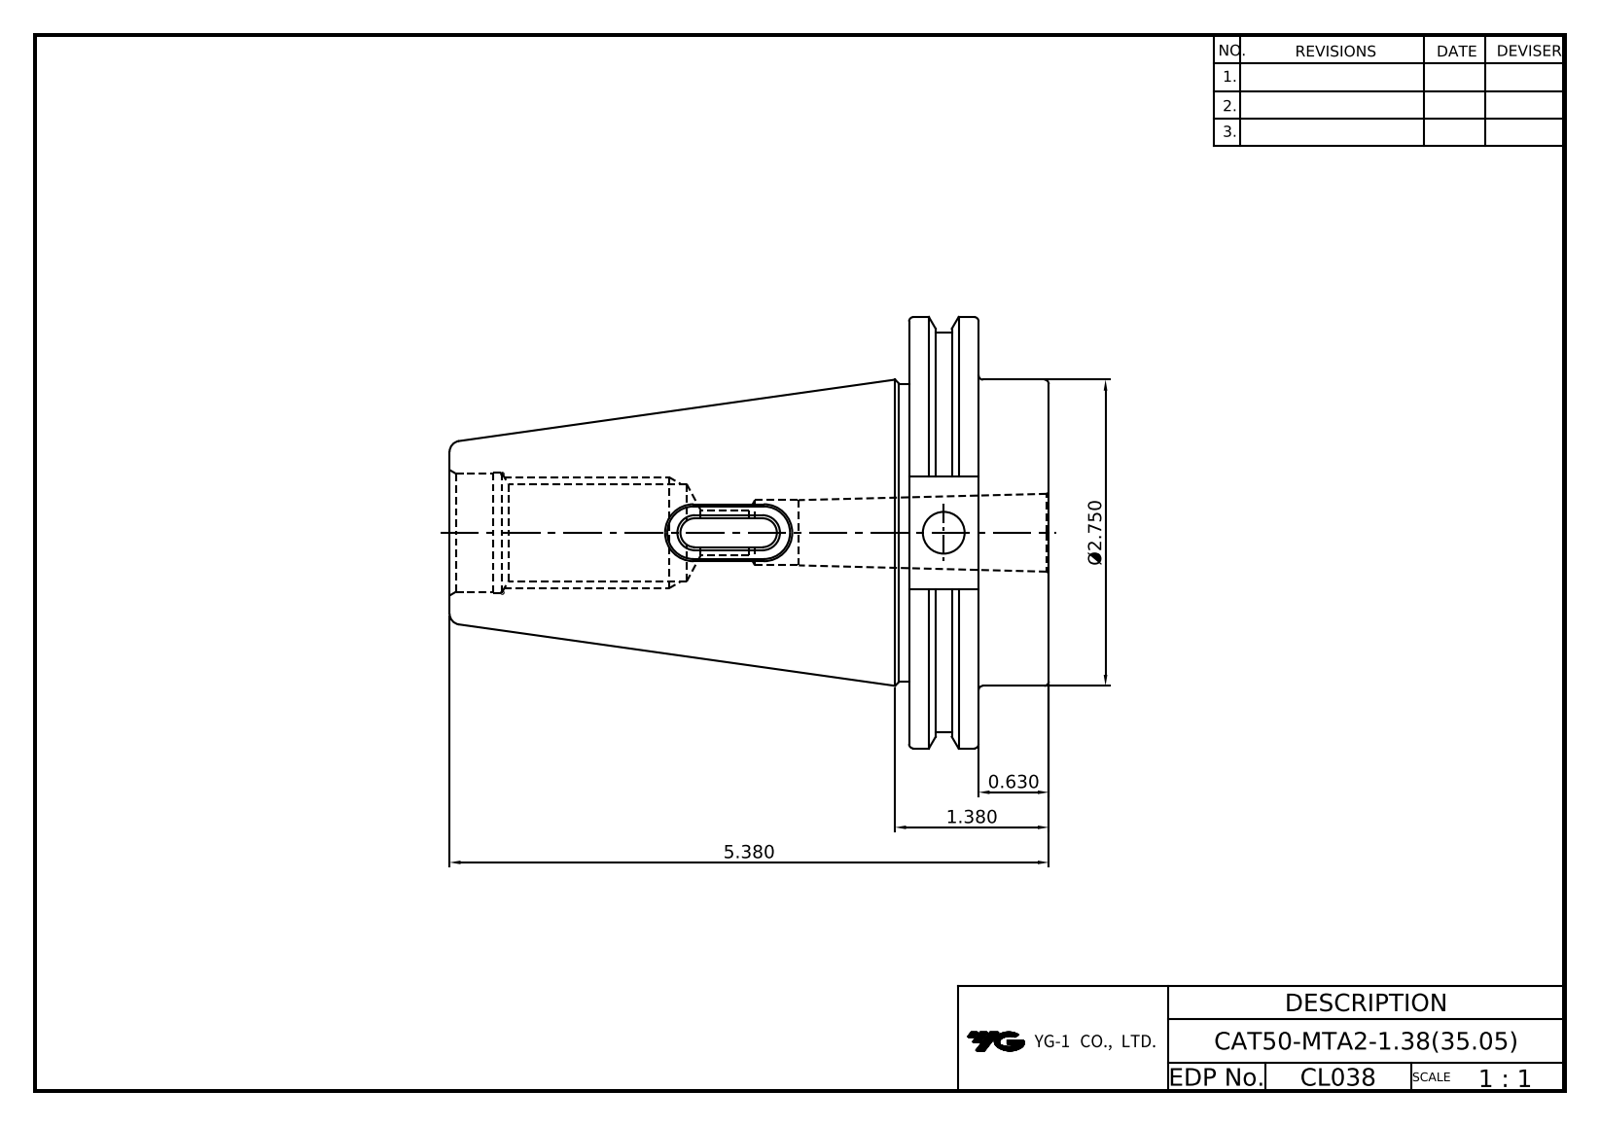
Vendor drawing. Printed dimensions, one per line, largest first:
5.380
Ø2.750
1.380
0.630
